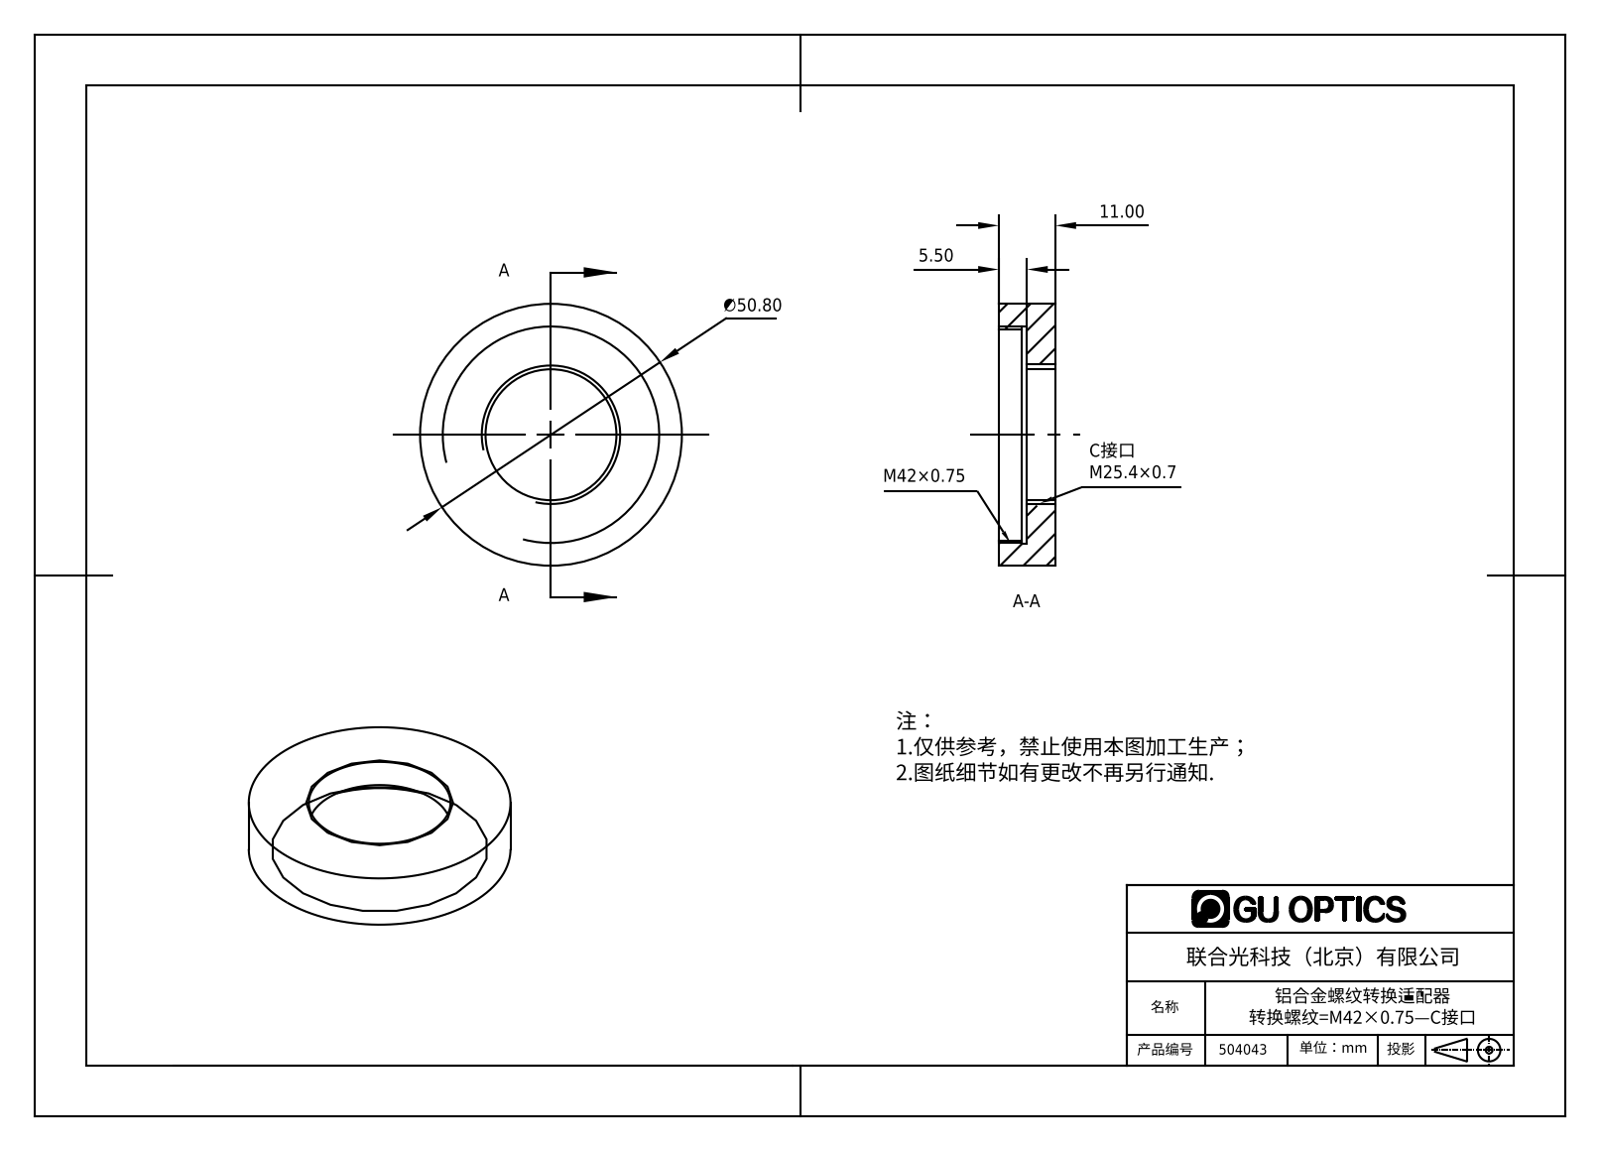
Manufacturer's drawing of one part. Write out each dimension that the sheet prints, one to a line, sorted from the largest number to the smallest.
∅50.80
11.00
5.50
